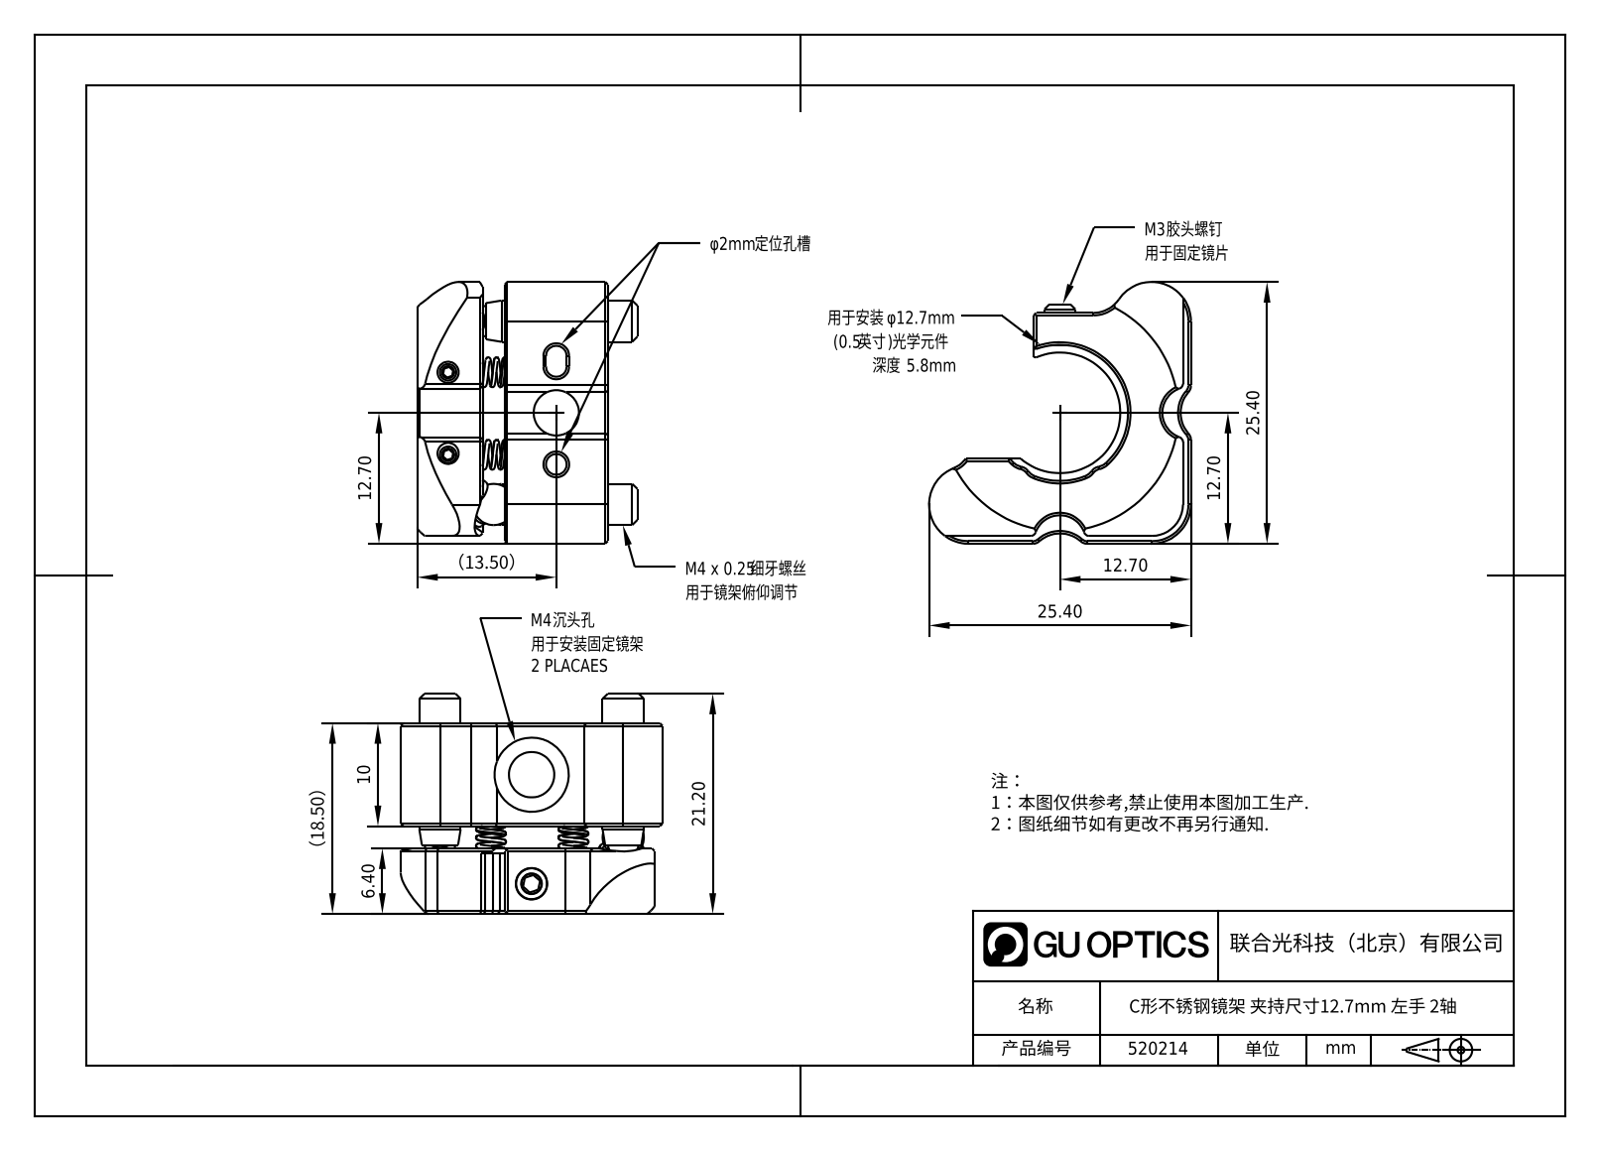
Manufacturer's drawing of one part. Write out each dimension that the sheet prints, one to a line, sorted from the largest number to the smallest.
25.40
25.40
21.20
（18.50）
（13.50）
12.70
12.70
12.70
10
6.40
